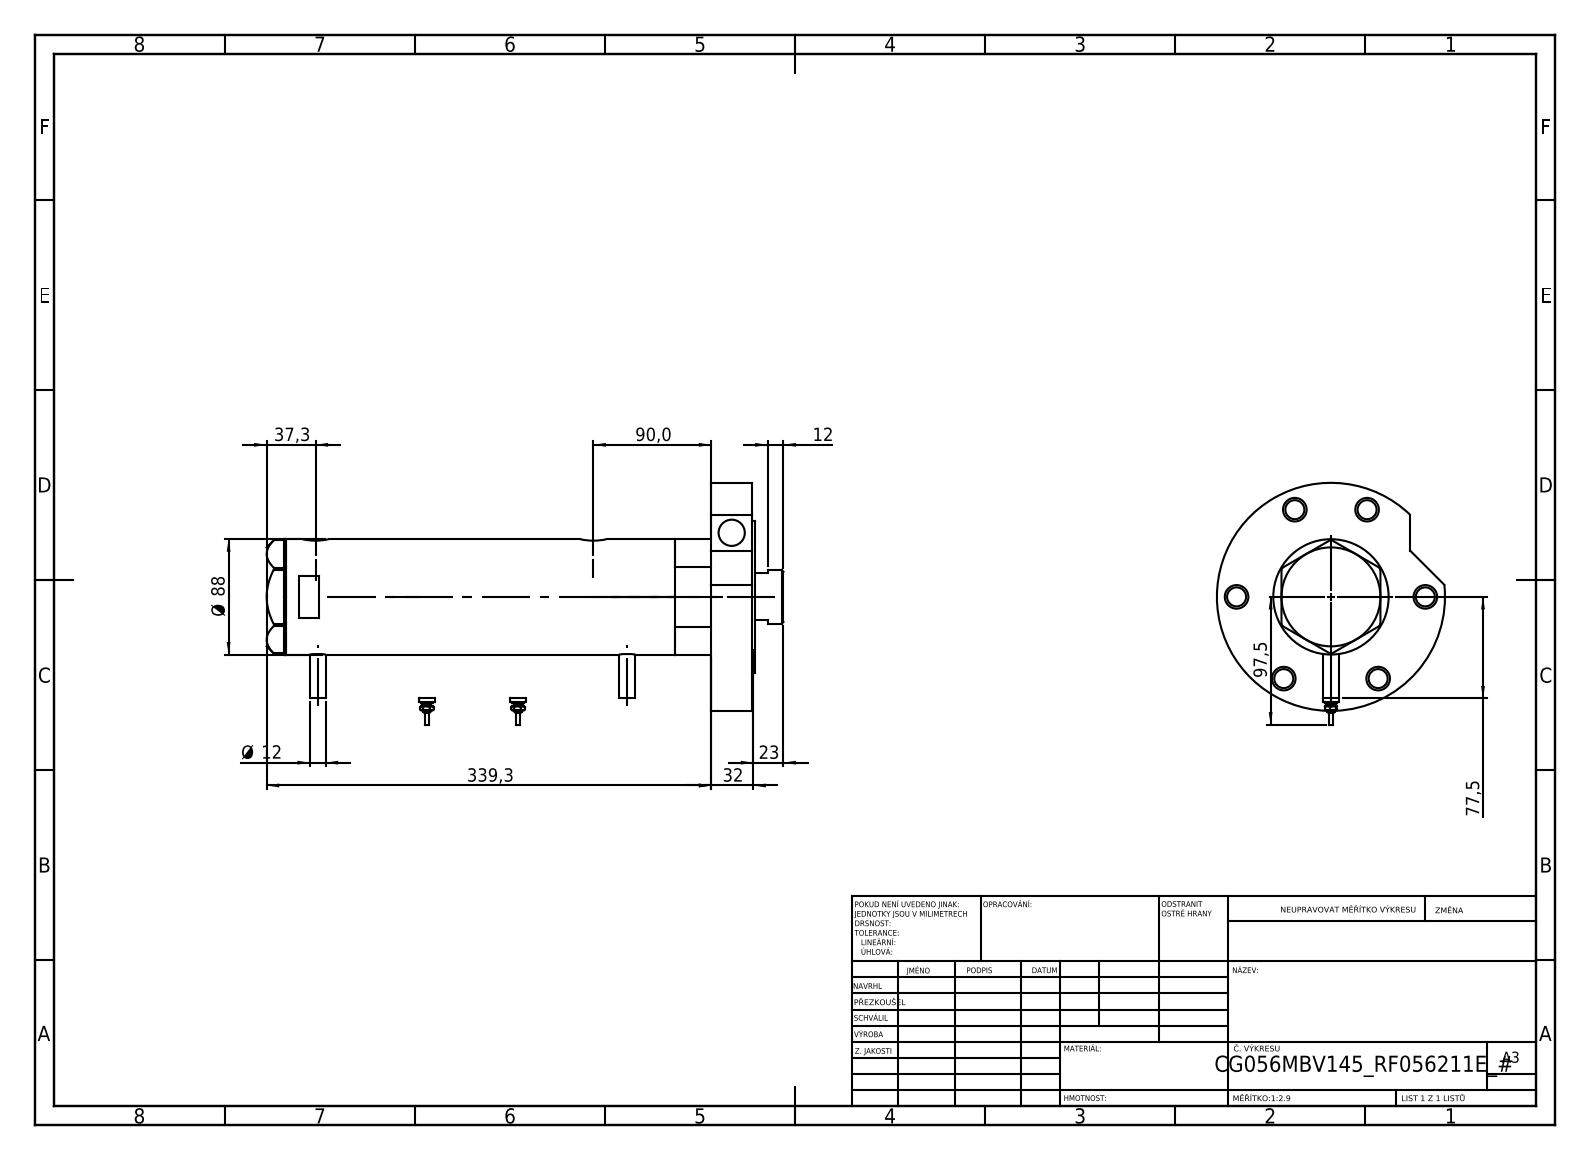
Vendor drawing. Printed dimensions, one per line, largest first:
339,3
97,5
90,0
Ø 88
77,5
37,3
32
23
12
Ø 12
